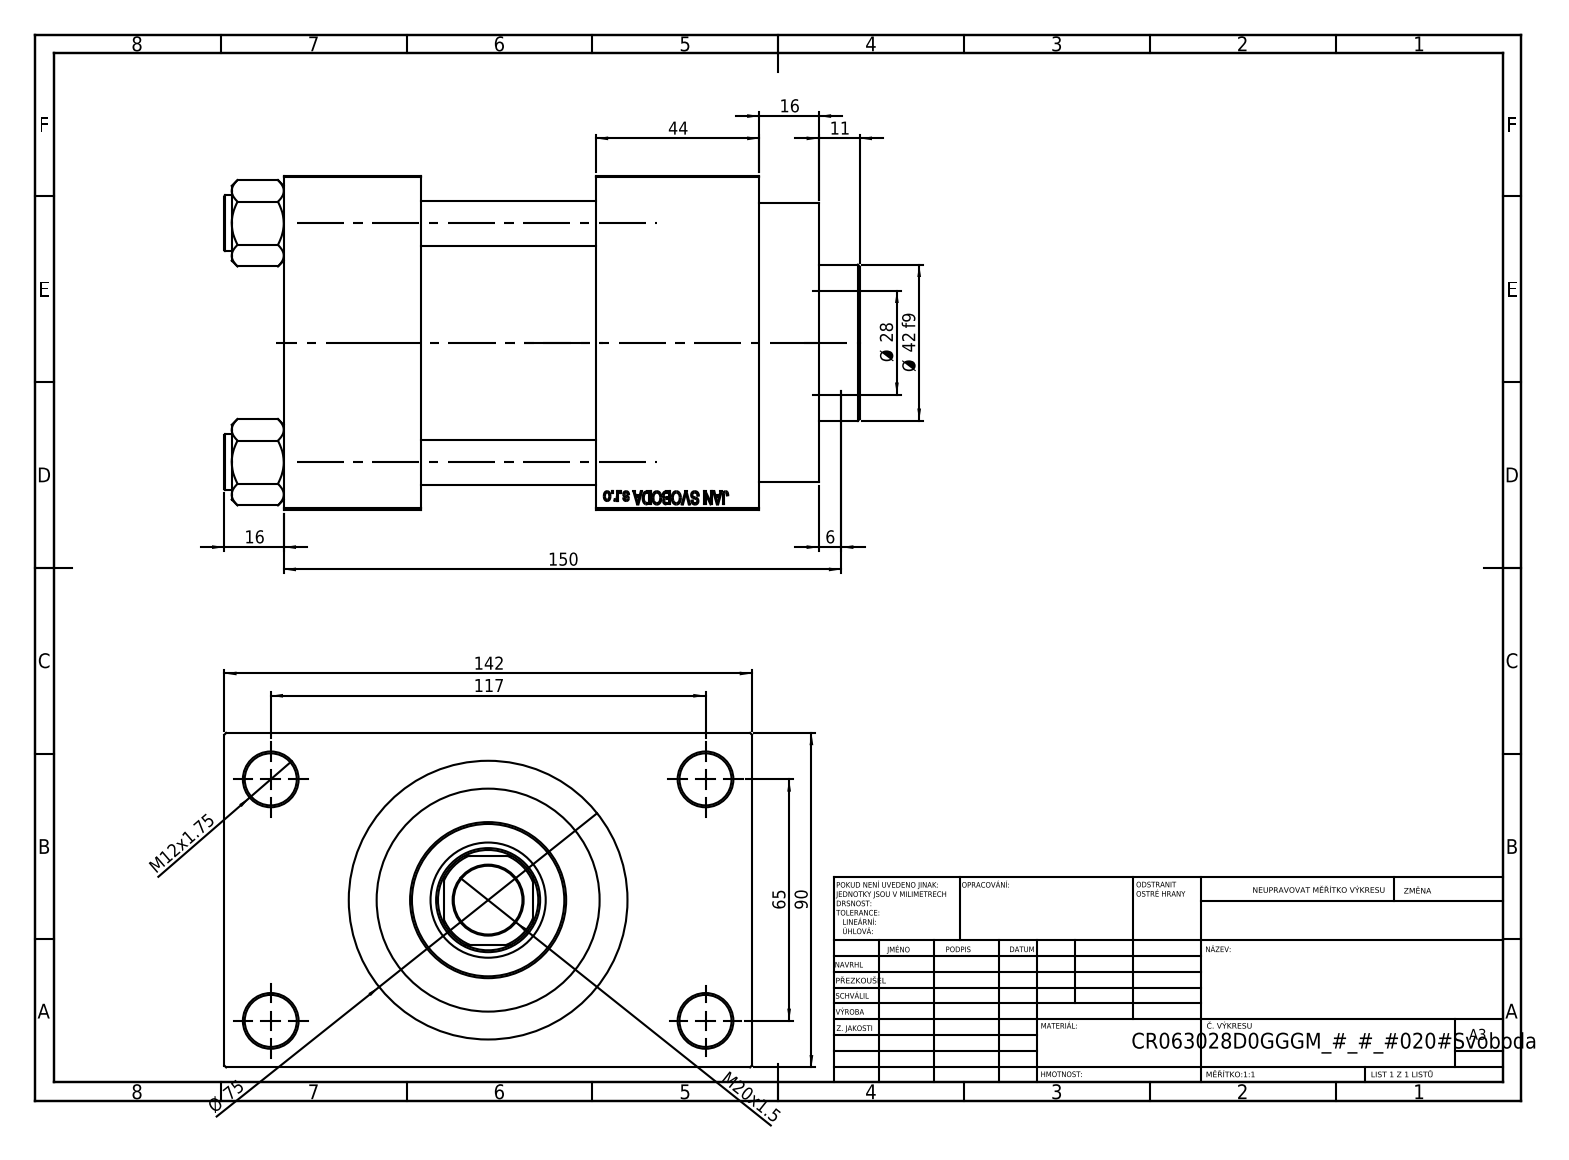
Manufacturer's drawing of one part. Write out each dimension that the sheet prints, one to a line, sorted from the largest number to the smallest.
150
142
117
90
Ø 75
65
44
Ø 42 f9
Ø 28
M20x1.5
16
16
M12x1.75
11
6
